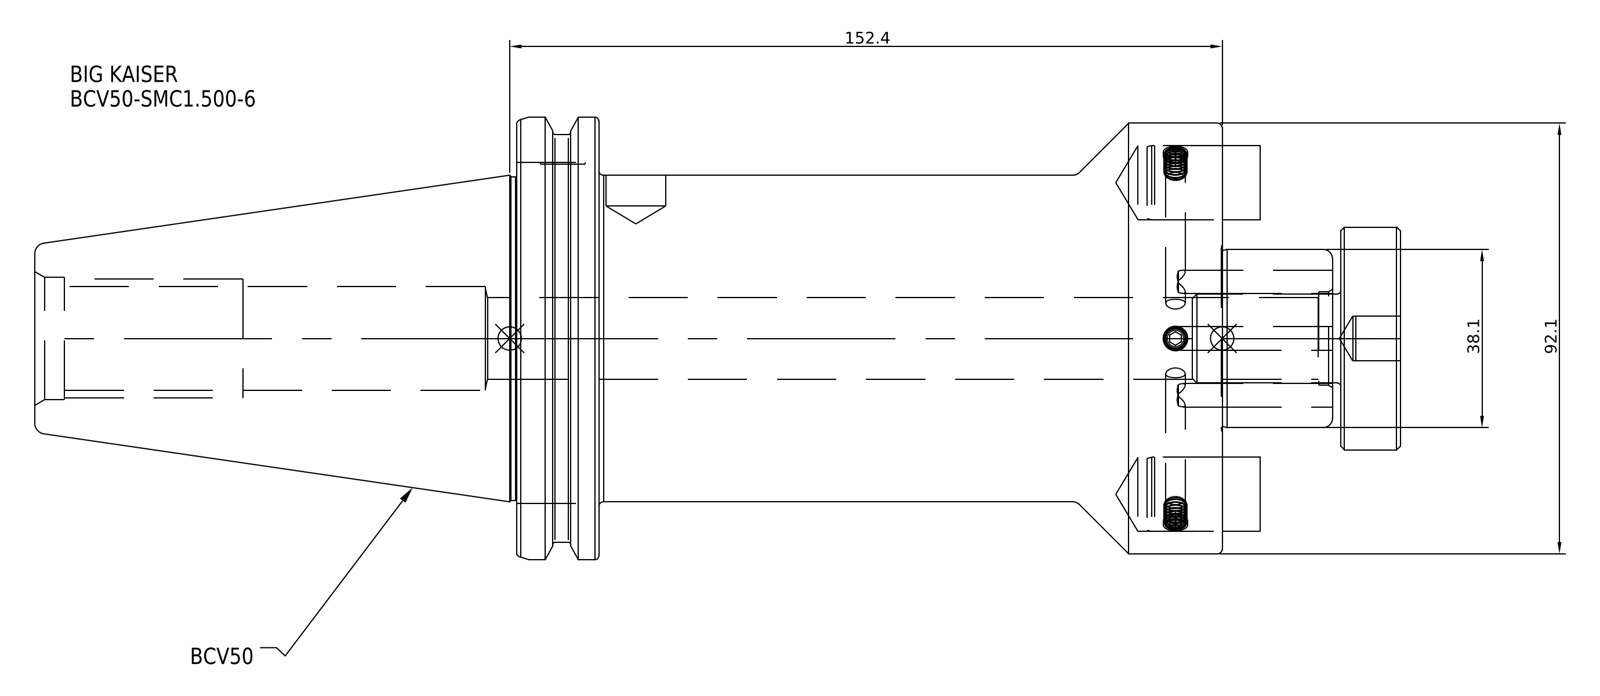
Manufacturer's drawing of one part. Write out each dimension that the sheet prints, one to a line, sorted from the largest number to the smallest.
152.4
92.1
38.1
